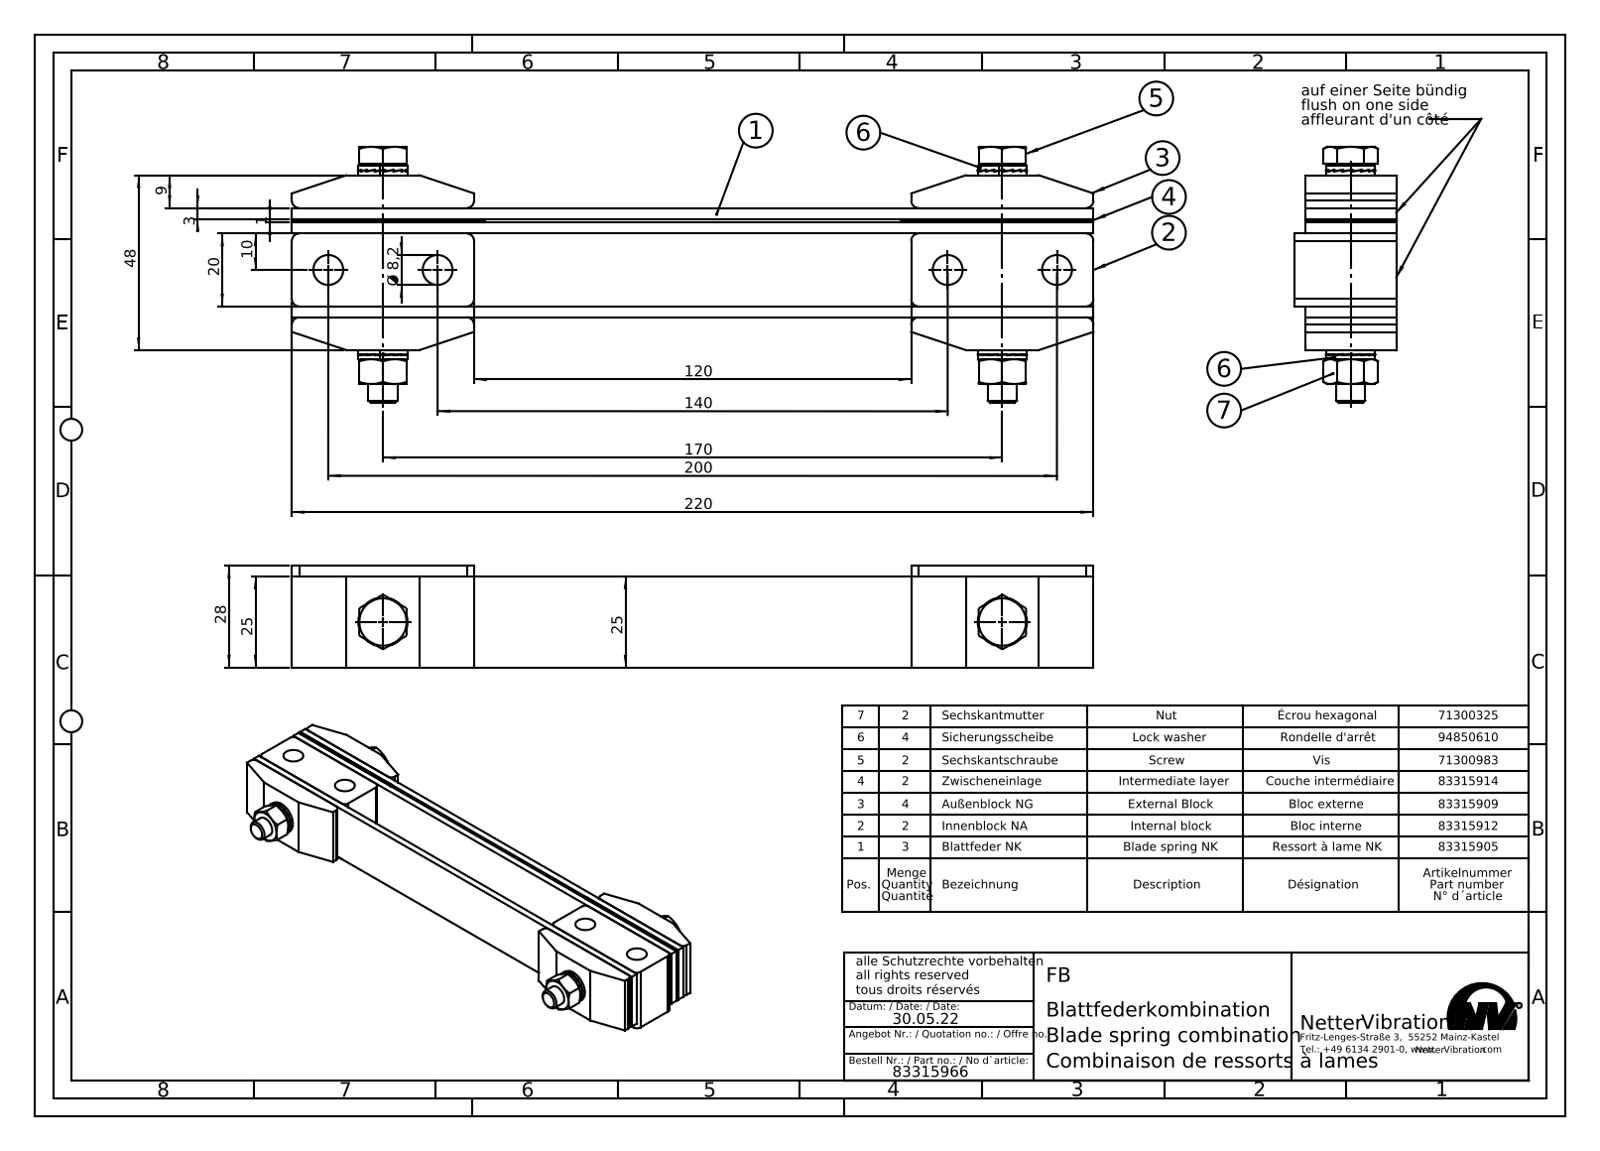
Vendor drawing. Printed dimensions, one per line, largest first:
220
200
170
140
120
48
28
25
25
20
10
9
Ø 8,2
3
1
